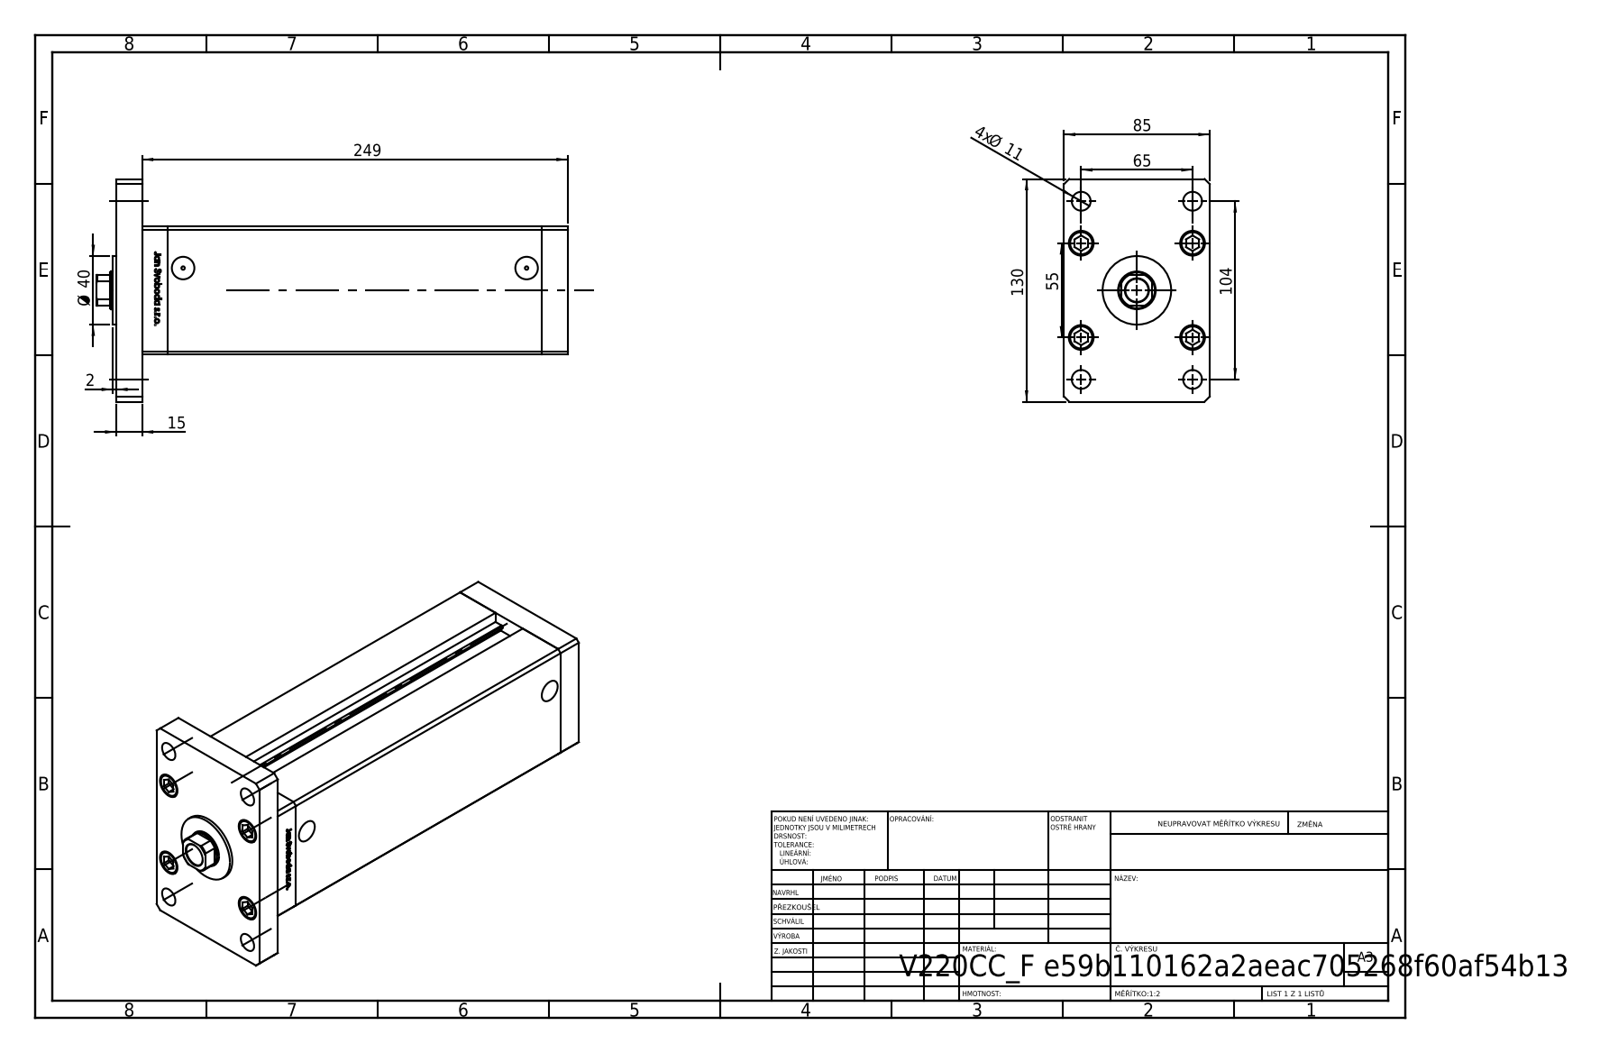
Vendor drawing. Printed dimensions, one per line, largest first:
249
130
104
85
65
55
Ø 40
15
4x Ø 11
2
